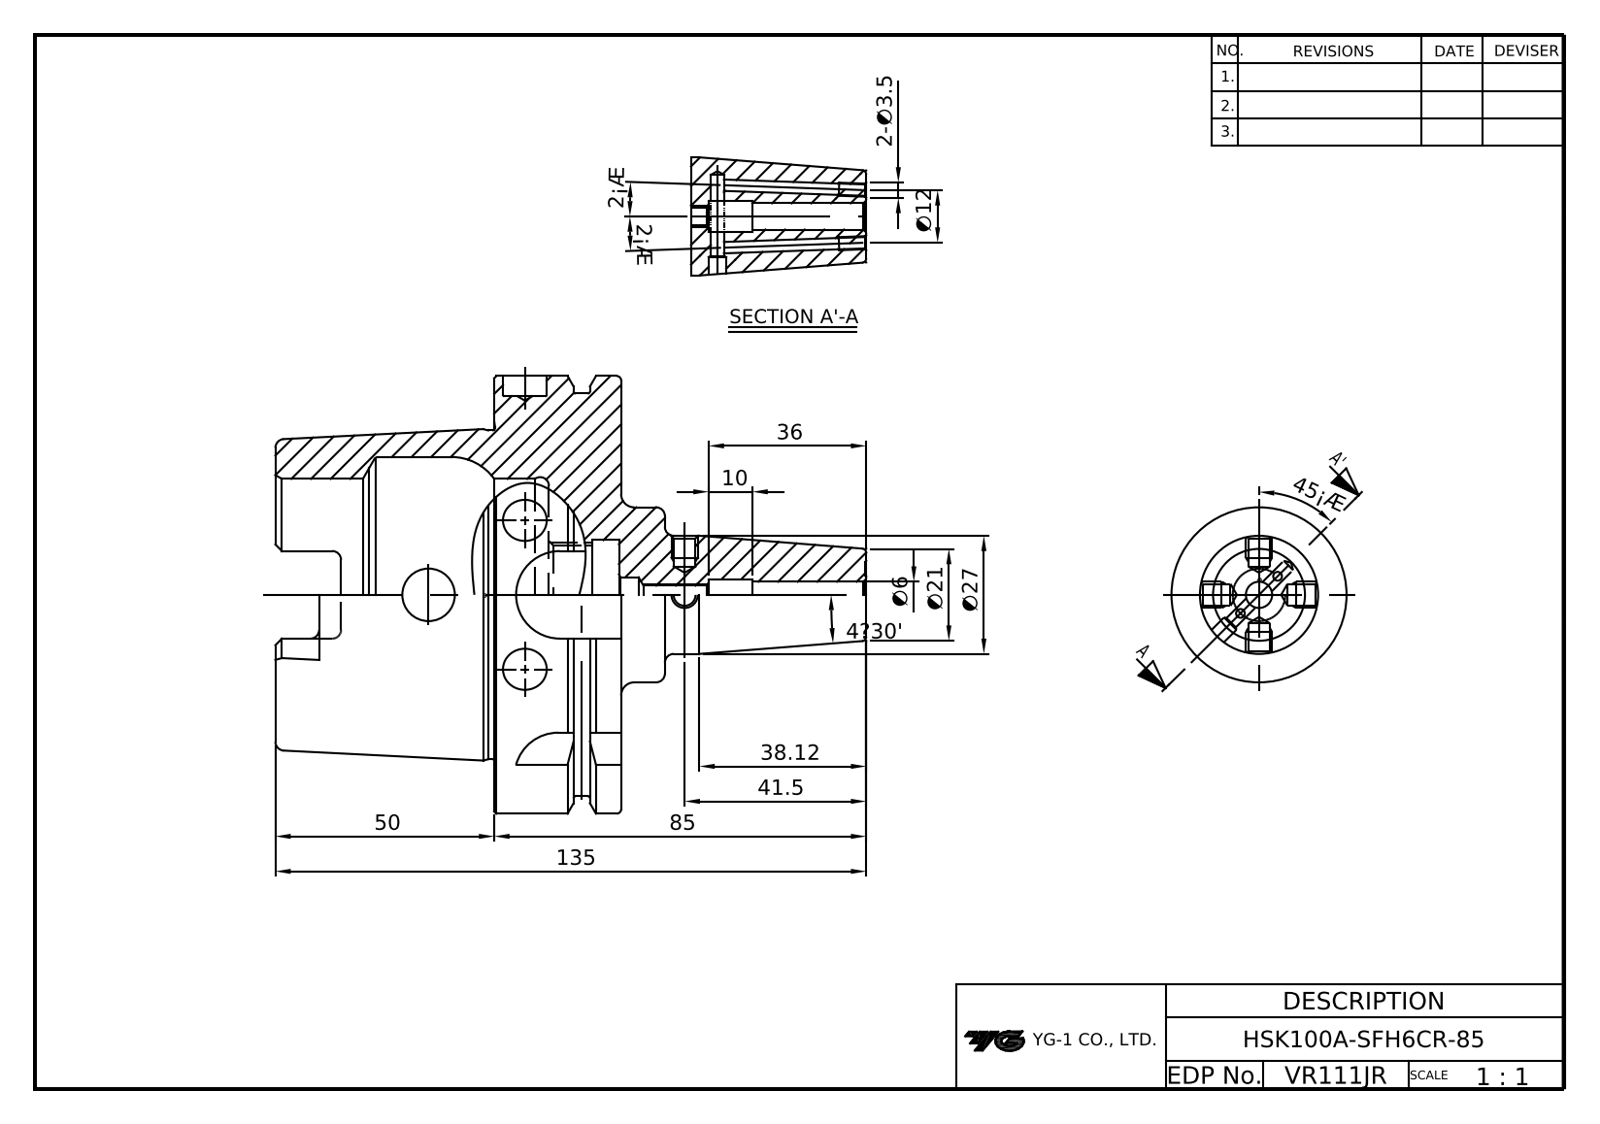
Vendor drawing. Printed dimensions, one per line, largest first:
358.00
358.00
225.00
135.00
85.00
50.00
41.50
38.12
36.00
27.00
21.00
12.00
10.00
6.00
4?30'
3.50
